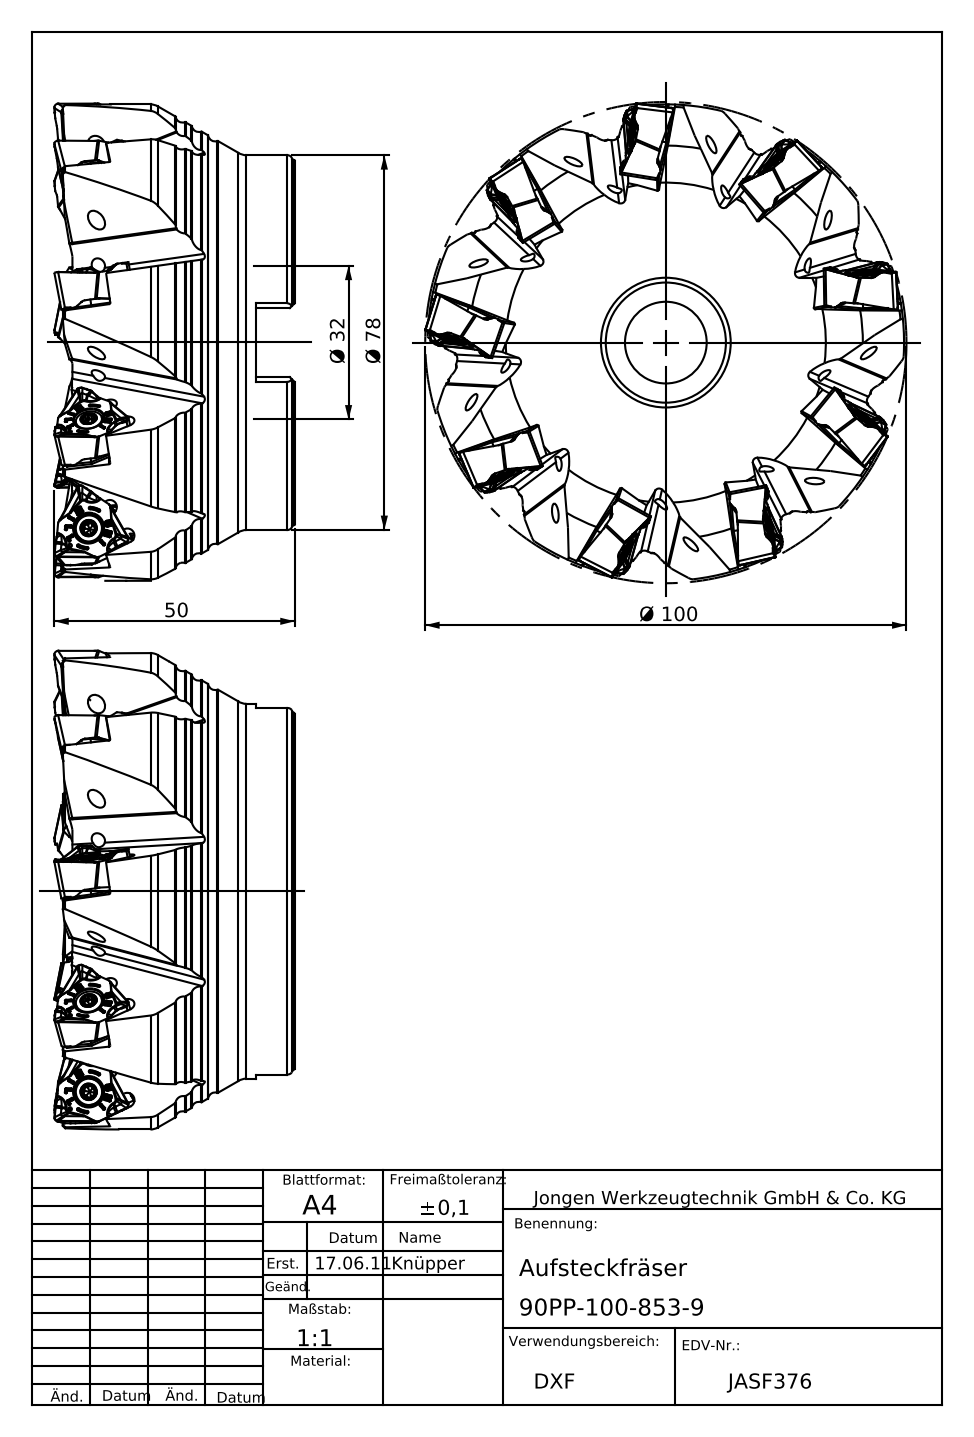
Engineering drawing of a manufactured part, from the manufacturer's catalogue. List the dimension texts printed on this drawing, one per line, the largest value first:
Ø 100
Ø 78
50
Ø 32
